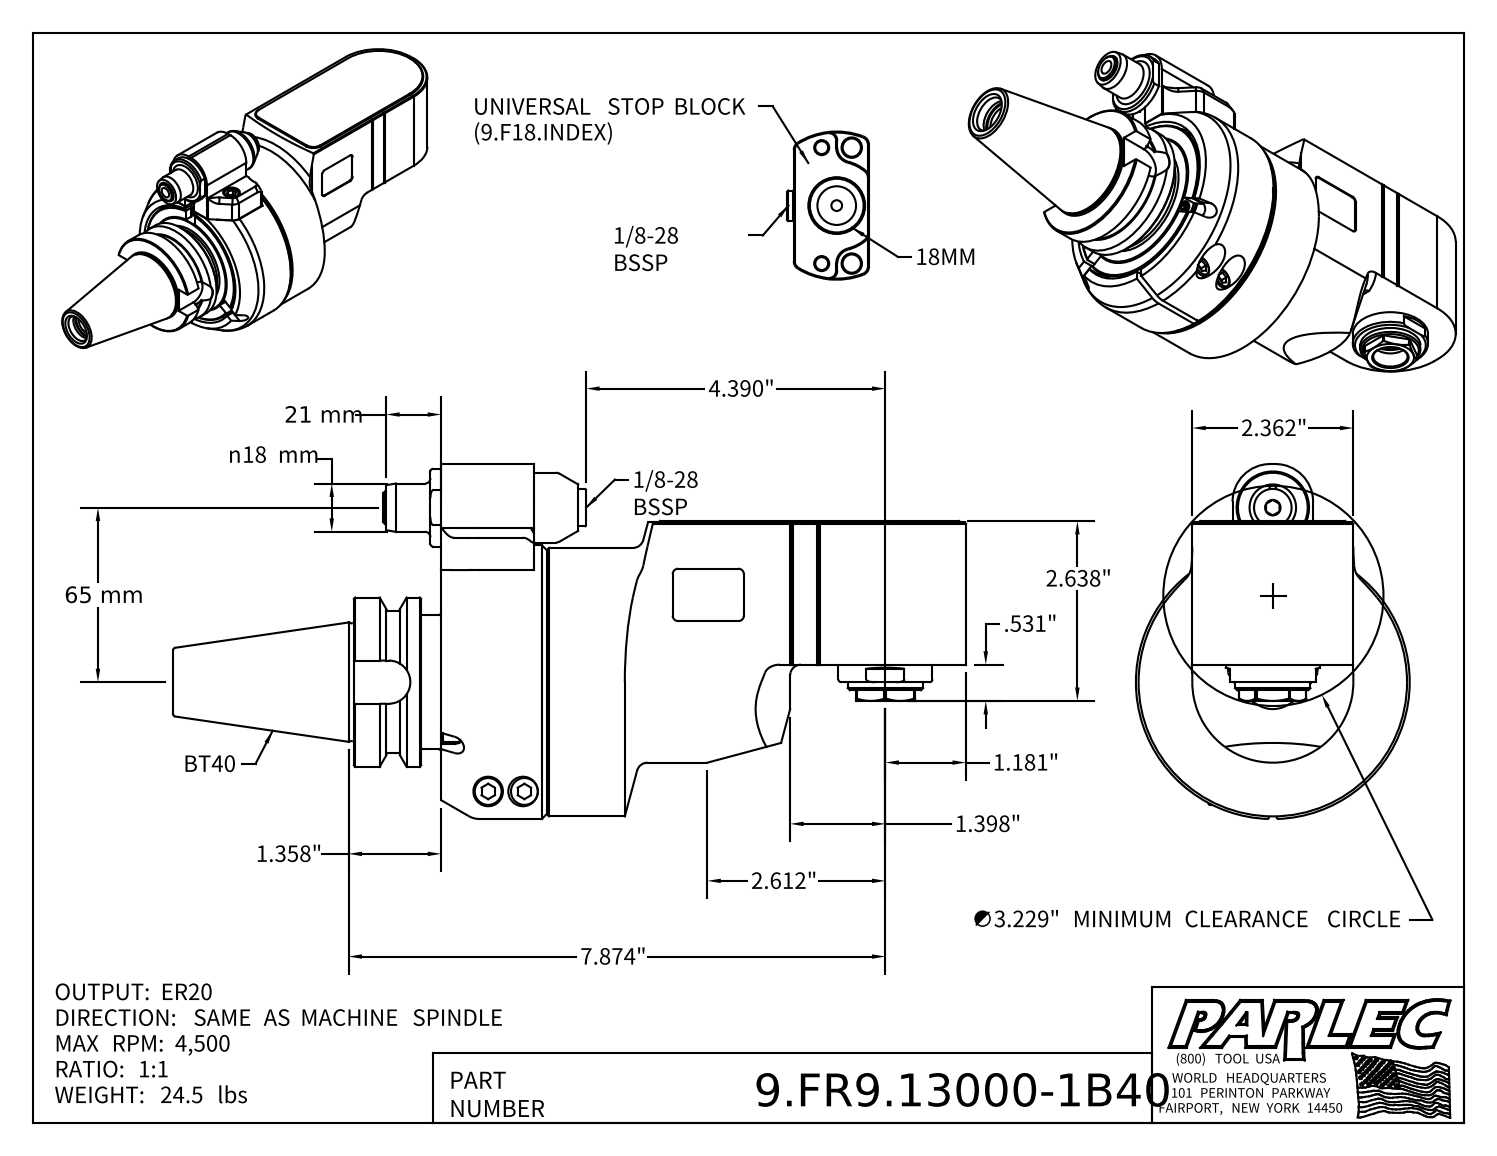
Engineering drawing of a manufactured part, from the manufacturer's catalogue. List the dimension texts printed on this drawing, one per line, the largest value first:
65 mm
21 mm
n18 mm
7.874"
4.390"
∅3.229" MINIMUM CLEARANCE CIRCLE
2.638"
2.612"
2.362"
1.398"
1.358"
1.181"
.531"
